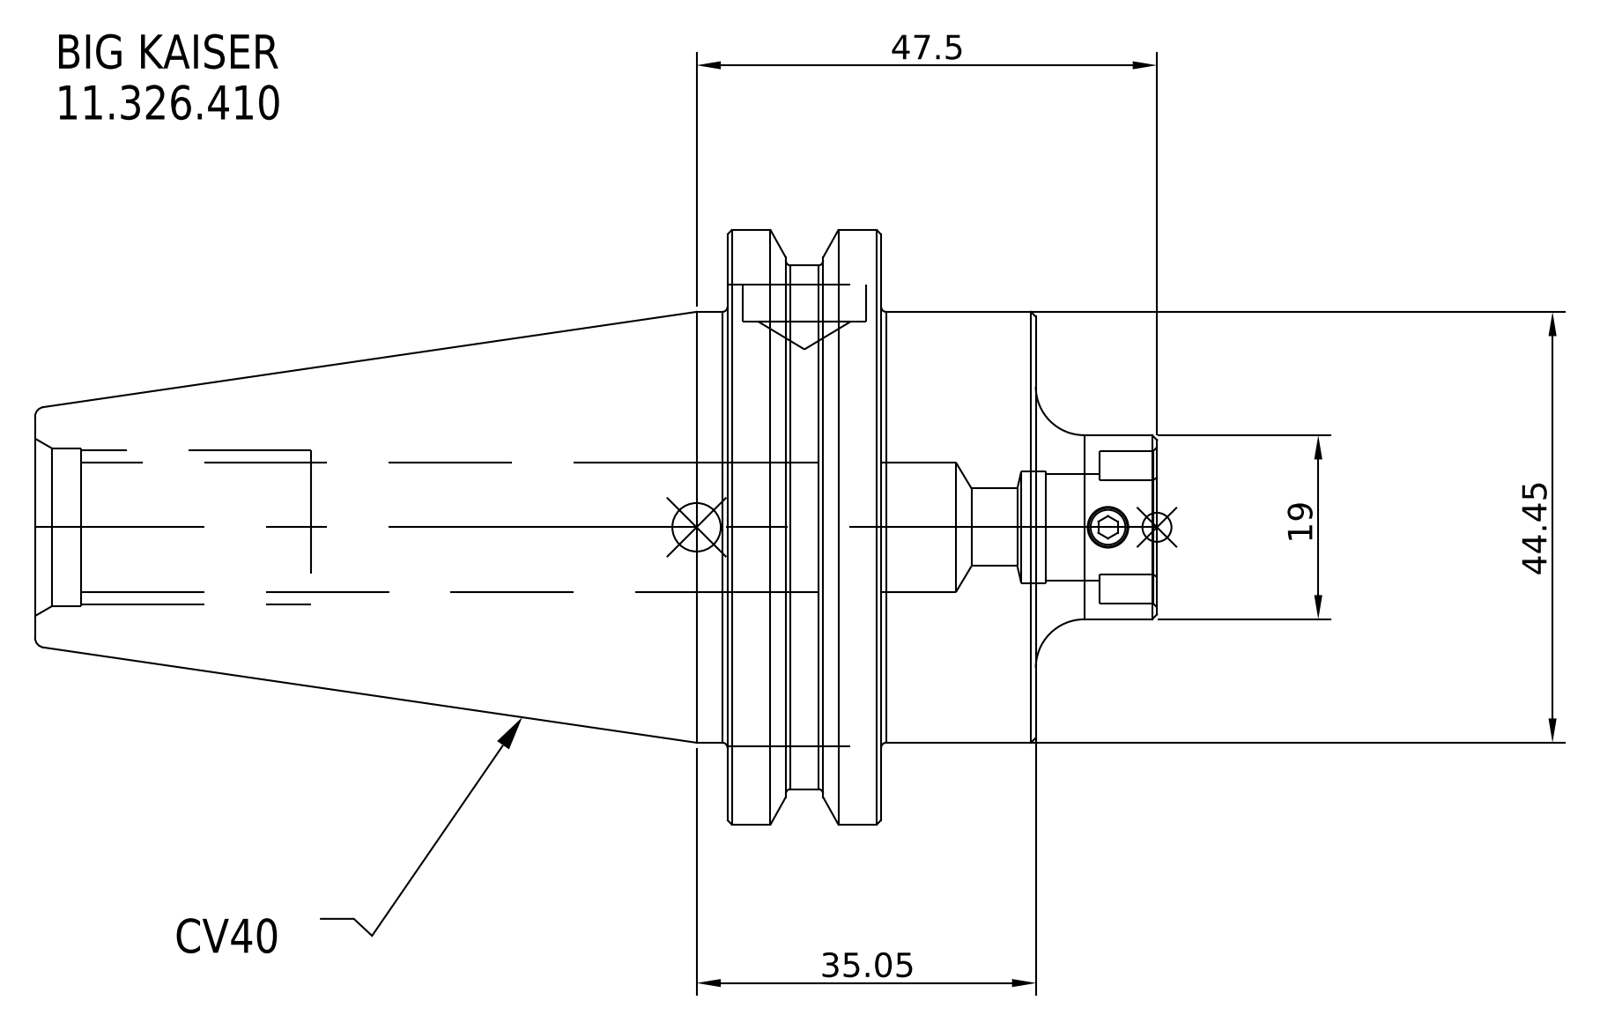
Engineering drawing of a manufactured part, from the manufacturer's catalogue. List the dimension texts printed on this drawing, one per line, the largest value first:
47.5
44.45
35.05
19
